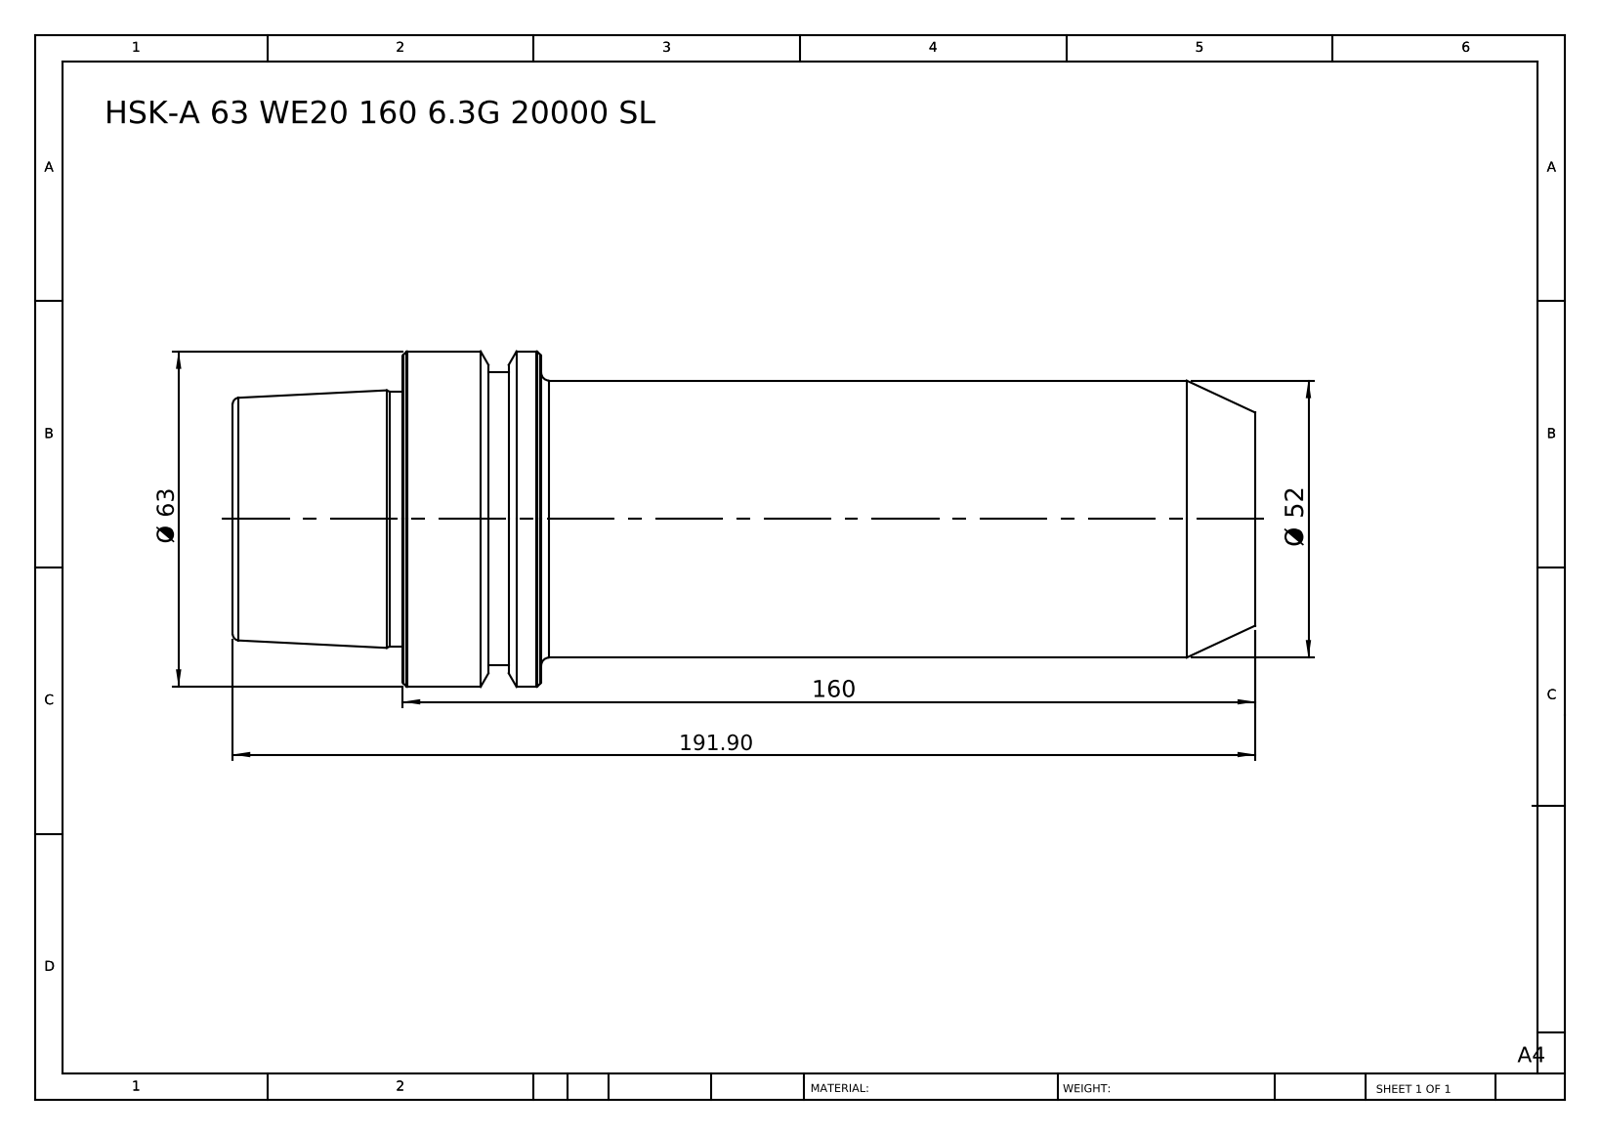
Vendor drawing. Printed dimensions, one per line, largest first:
191.90
160
Ø 63
Ø 52
